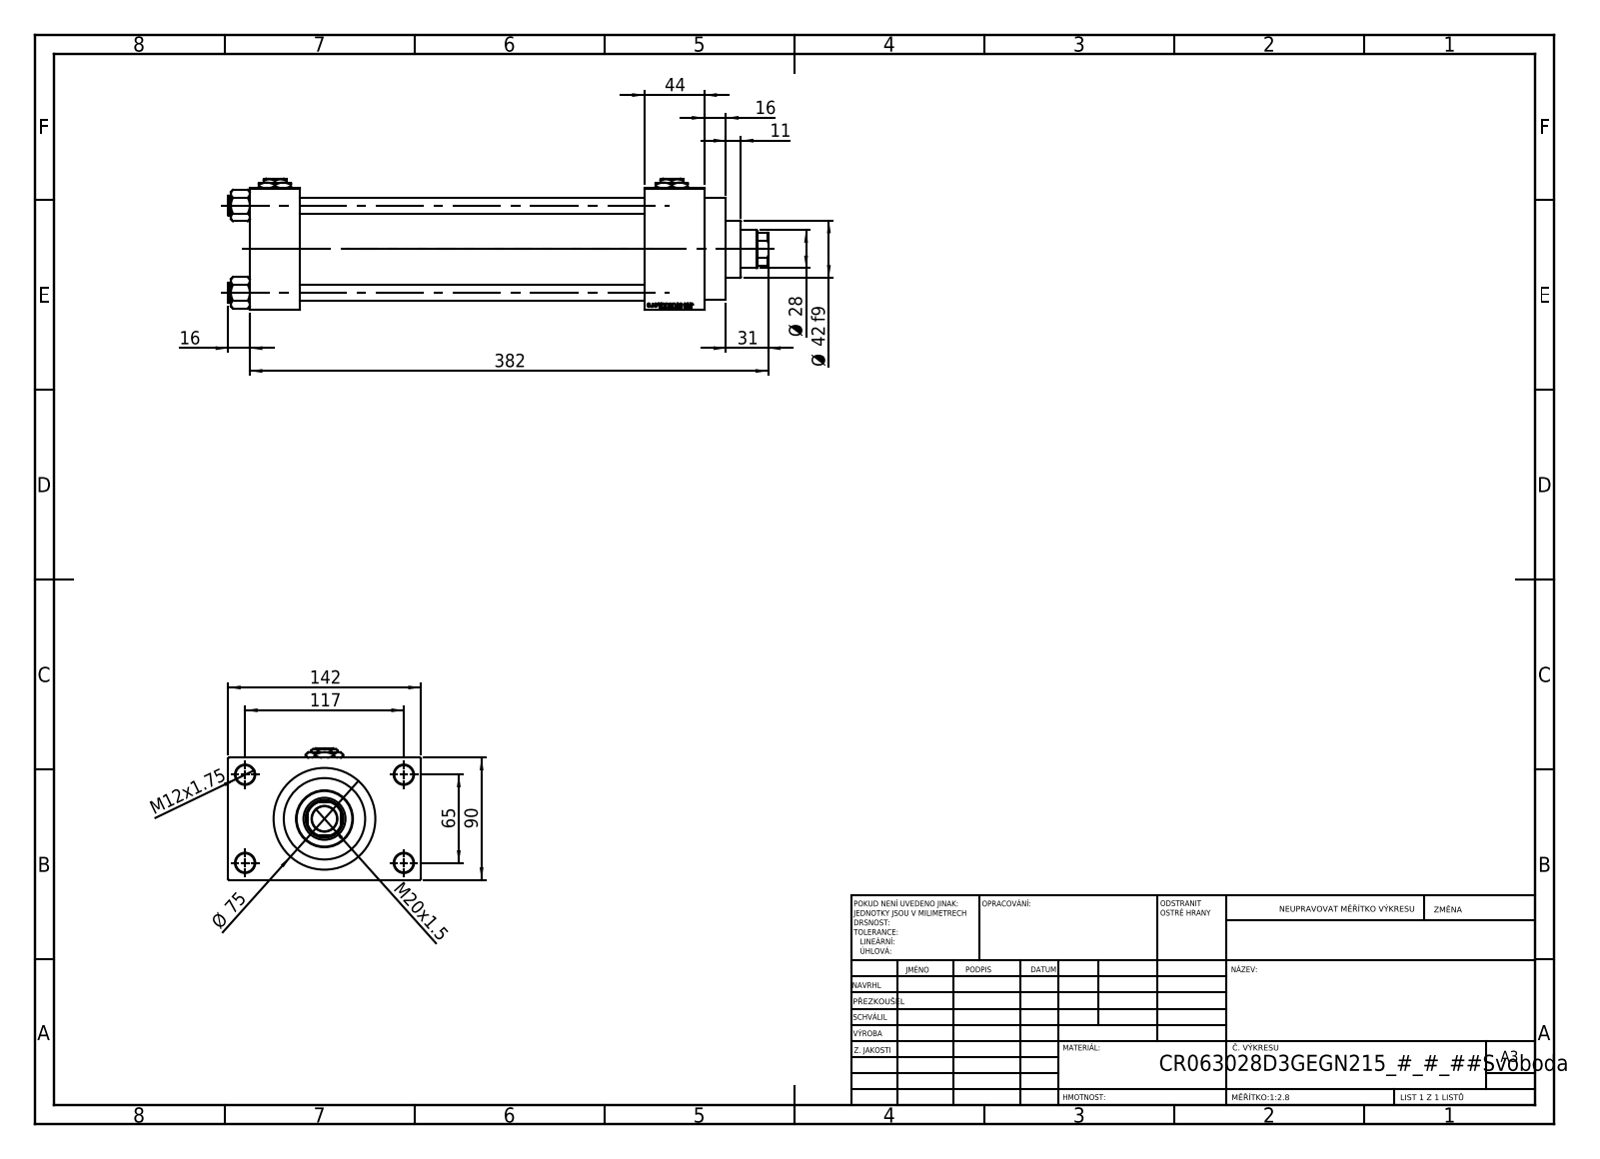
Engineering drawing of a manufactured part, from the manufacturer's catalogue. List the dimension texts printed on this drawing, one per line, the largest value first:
382
142
117
90
Ø 75
65
44
Ø 42 f9
31
Ø 28
M20x1.5
16
16
M12x1.75
11
